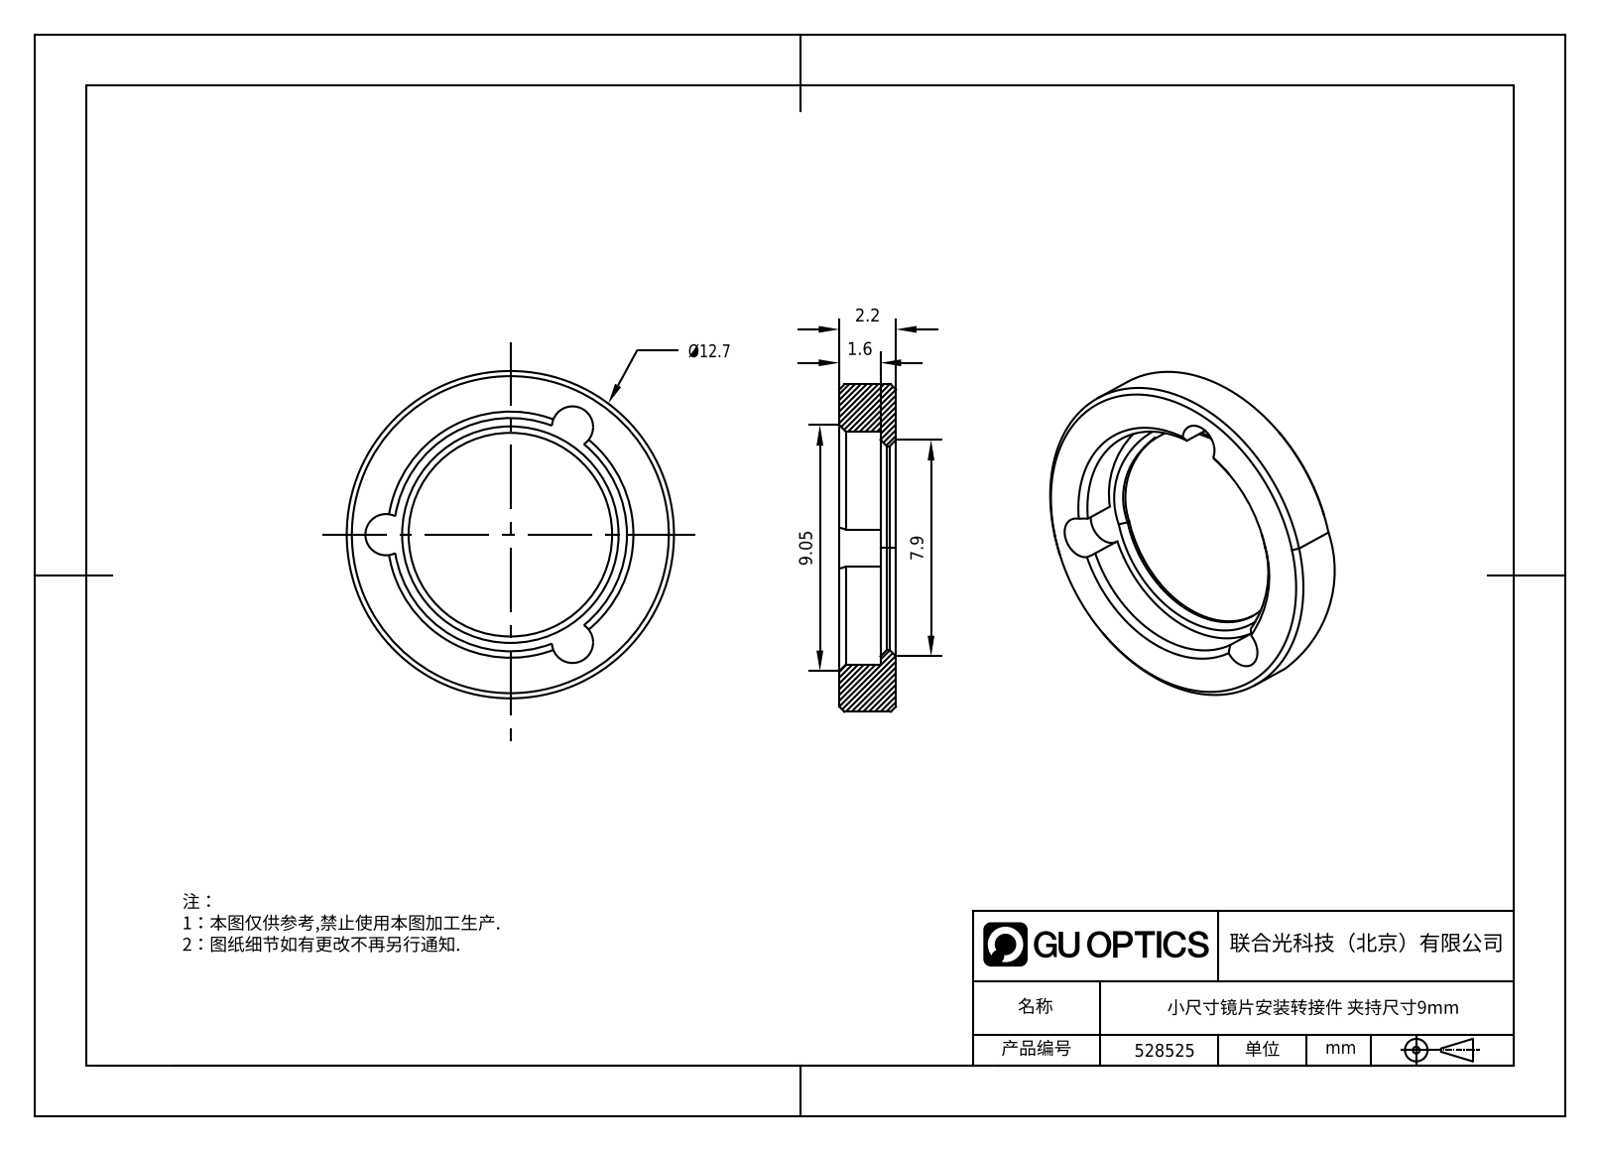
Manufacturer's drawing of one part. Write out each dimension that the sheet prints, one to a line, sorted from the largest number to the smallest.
9.05
7.9
2.2
1.6
